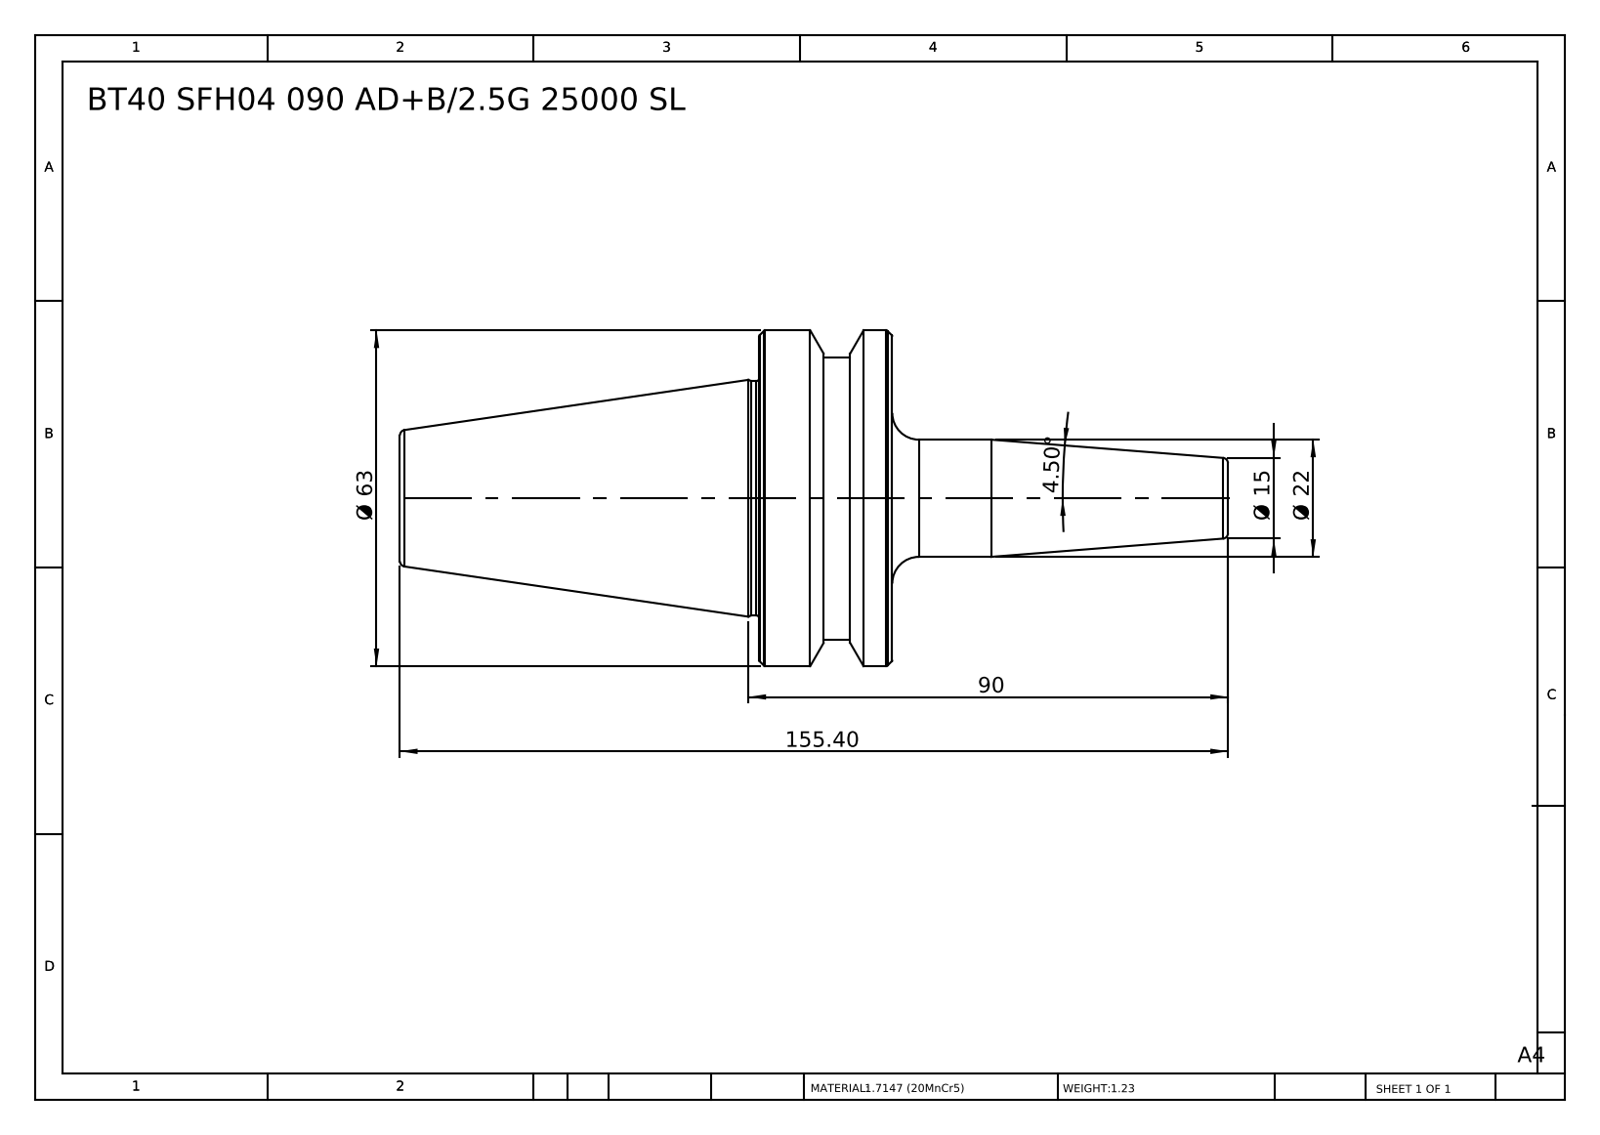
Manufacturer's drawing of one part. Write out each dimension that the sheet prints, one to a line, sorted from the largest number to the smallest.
155.40
90
Ø 63
Ø 22
Ø 15
4.50°
